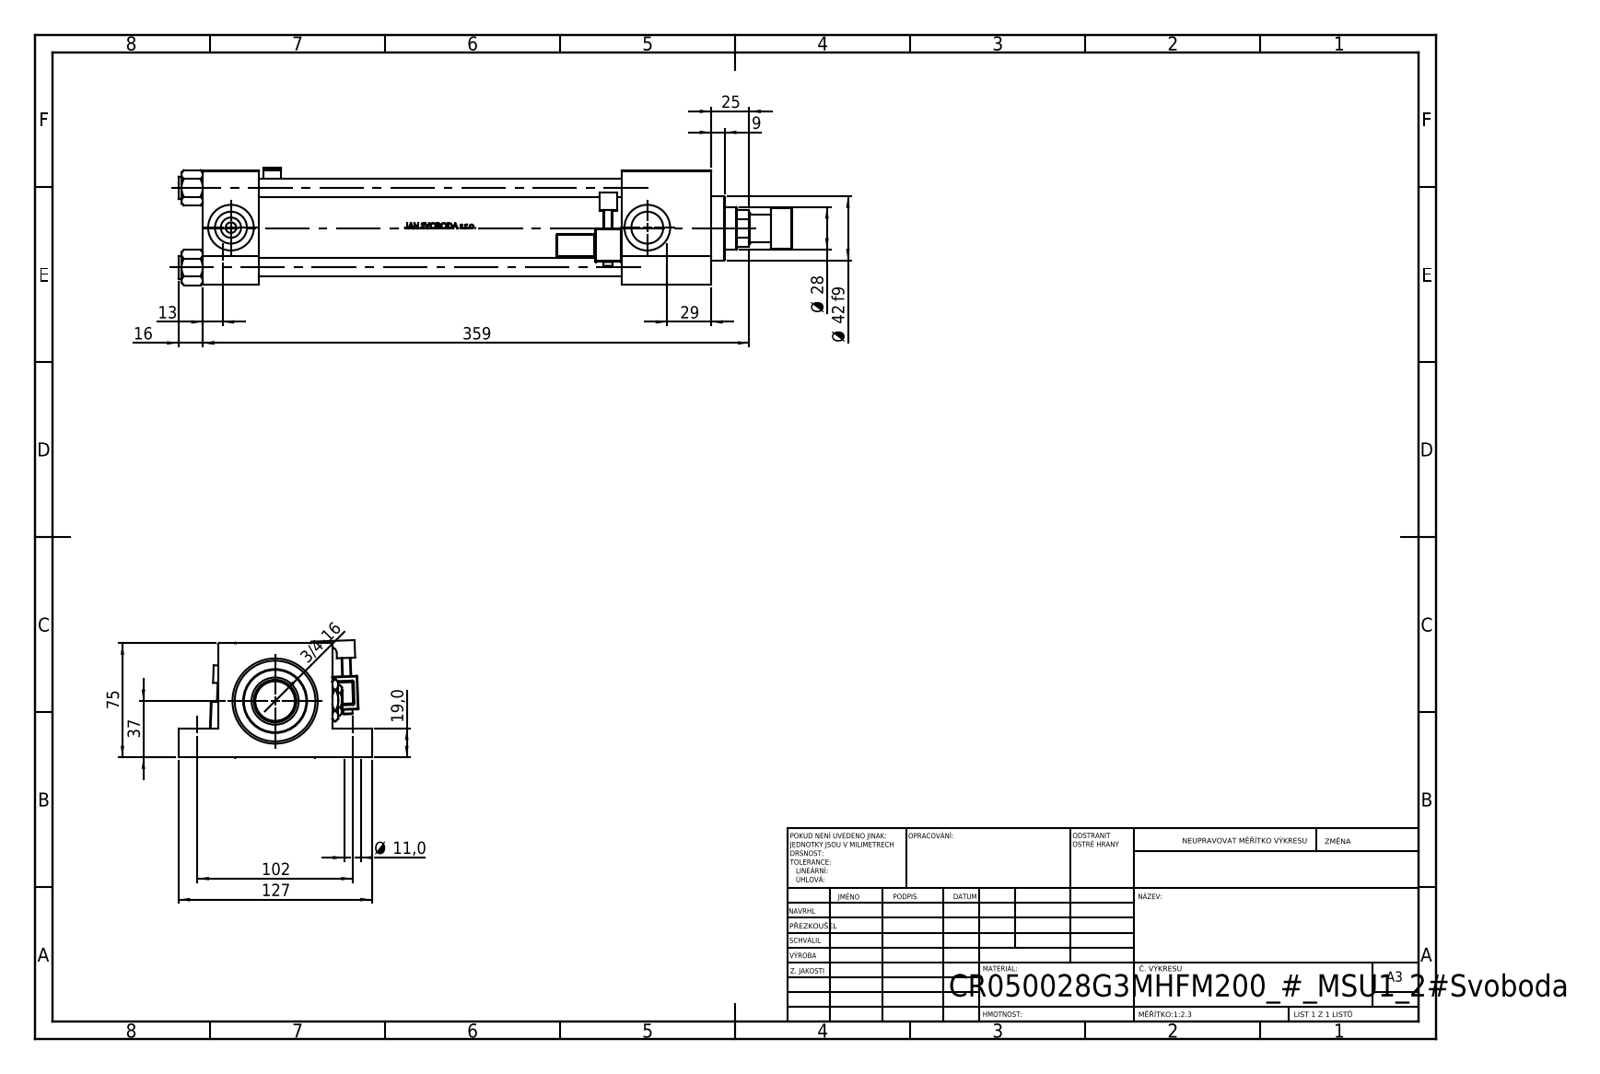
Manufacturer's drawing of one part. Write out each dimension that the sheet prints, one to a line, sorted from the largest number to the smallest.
359
127
102
75
Ø 42 f9
37
29
Ø 28
25
19,0
16
13
Ø 11,0
9
3/4-16
